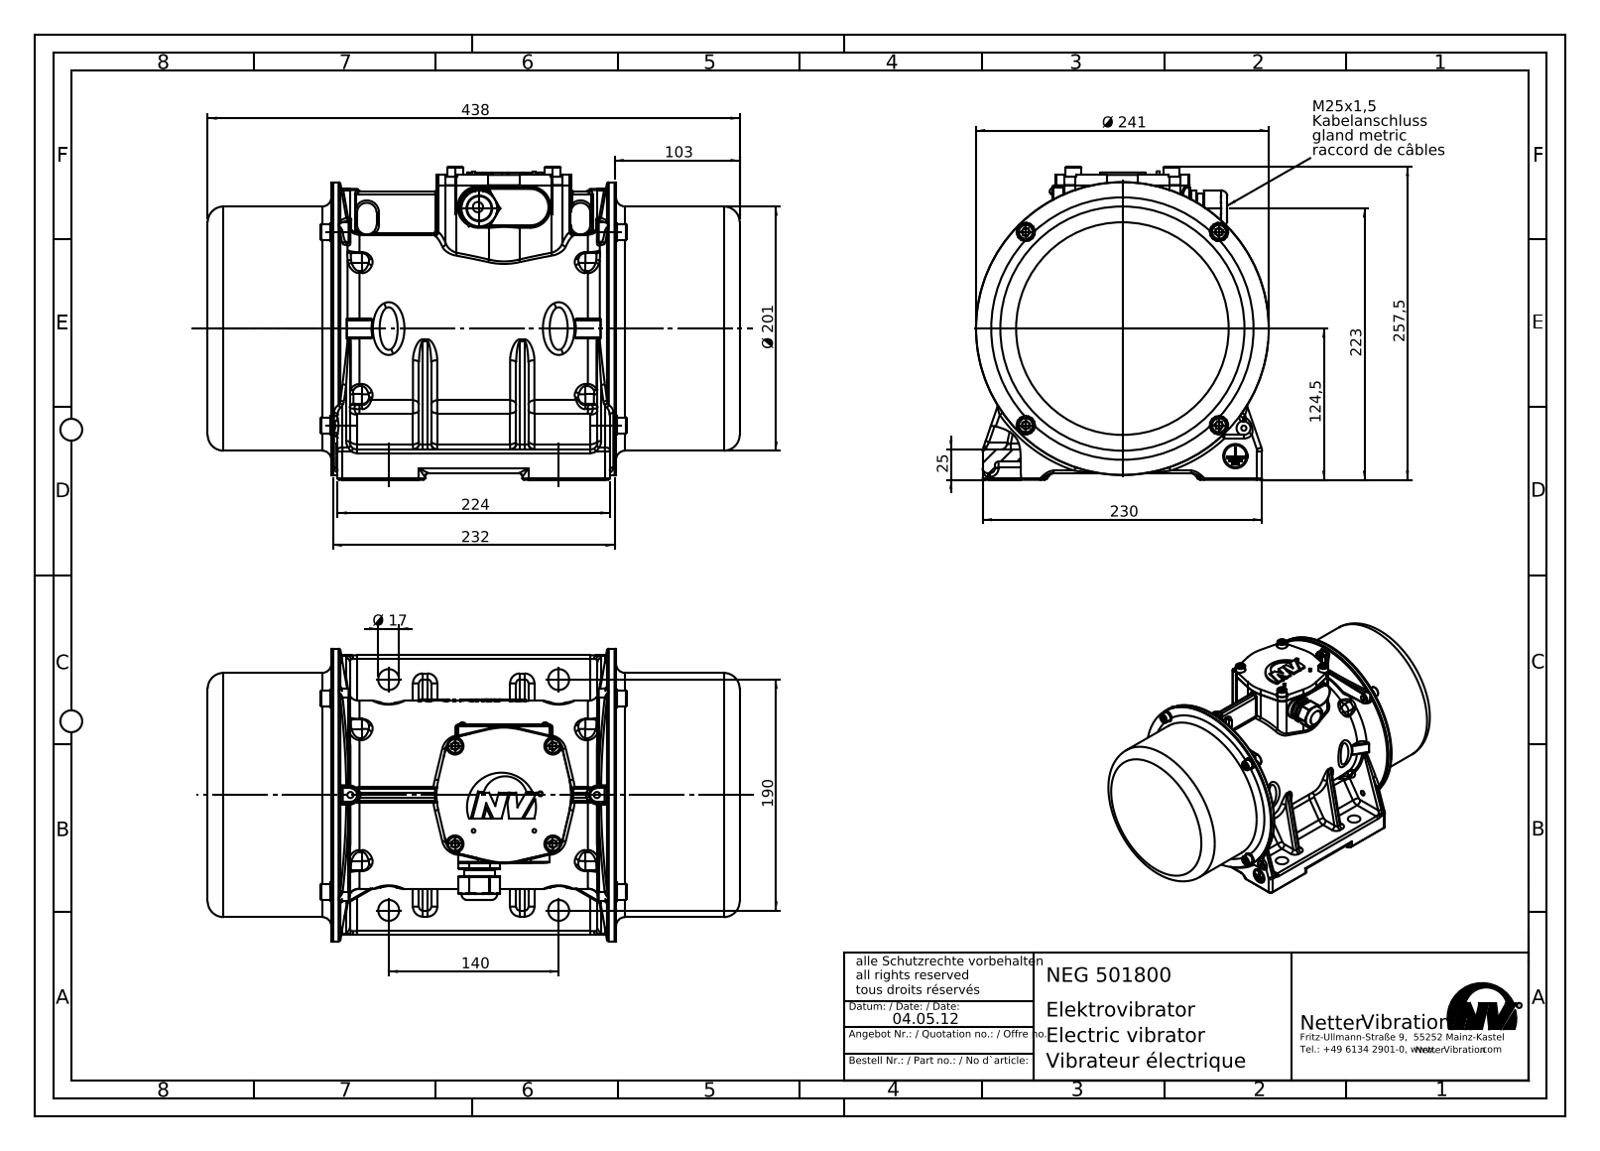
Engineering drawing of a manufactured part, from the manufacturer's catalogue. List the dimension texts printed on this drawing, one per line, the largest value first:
438
257,5
Ø 241
232
230
224
223
Ø 201
190
140
124,5
103
25
Ø 17
